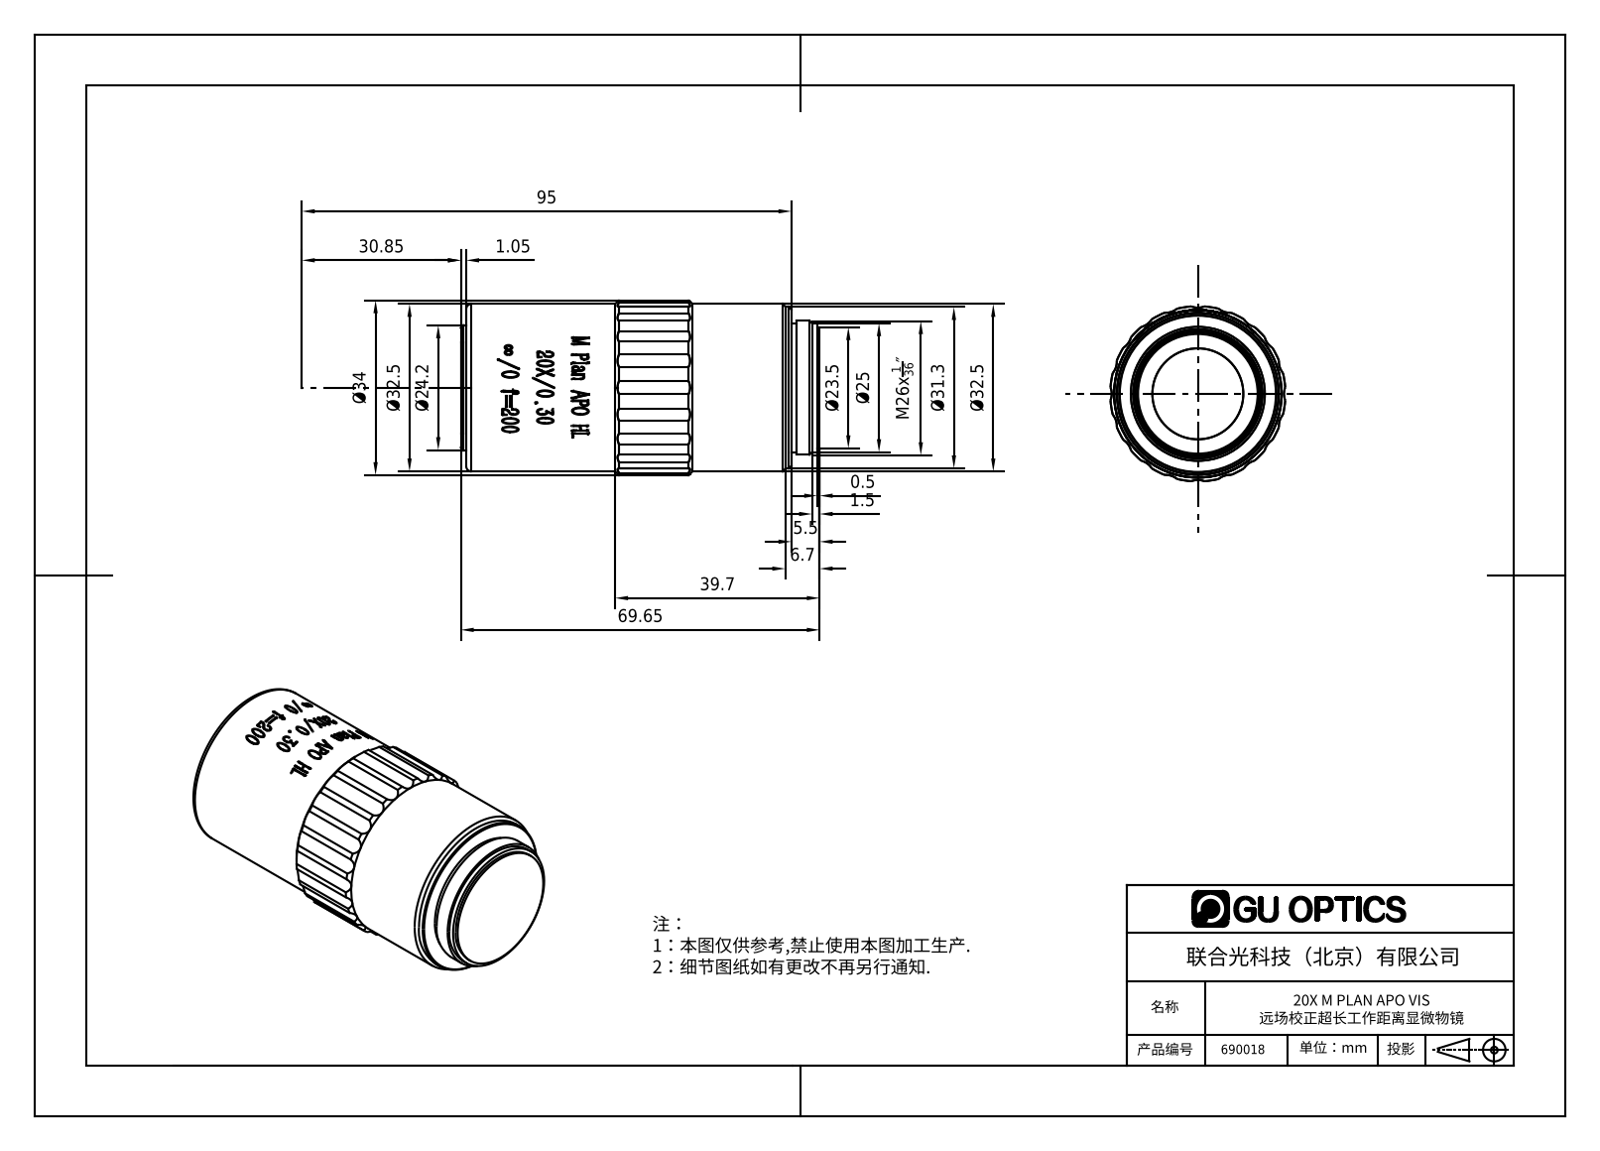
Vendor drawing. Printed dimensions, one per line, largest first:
95
69.65
39.7
Ø34
Ø32.5
Ø32.5
Ø31.3
30.85
M26x1/36″
Ø25
Ø24.2
Ø23.5
6.7
5.5
1.5
1.05
0.5
